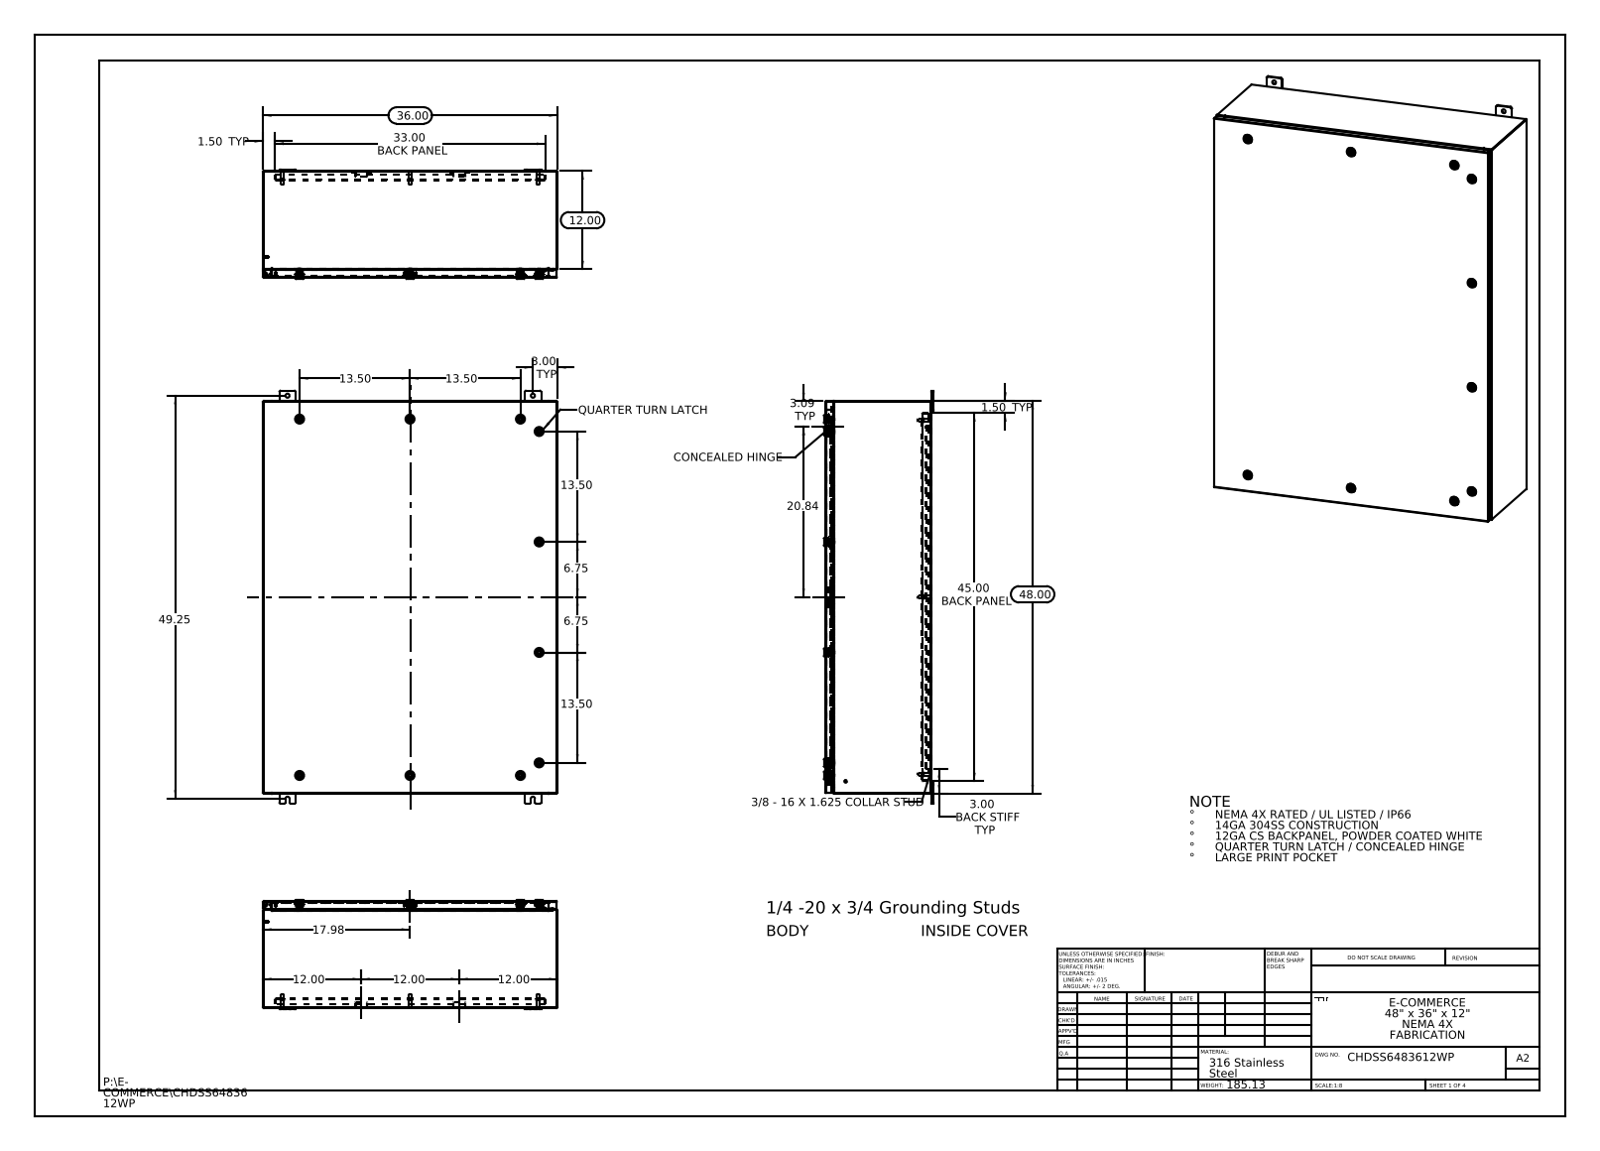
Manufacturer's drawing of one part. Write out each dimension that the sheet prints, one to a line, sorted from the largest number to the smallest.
49.25
48.00
45.00 BACK PANEL
36.00
33.00 BACK PANEL
20.84
17.98
13.50
13.50
13.50
13.50
12.00
12.00
12.00
12.00
6.75
6.75
3.09 TYP
3.00 TYP
3.00 BACK STIFF TYP
1.50 TYP
1.50 TYP
